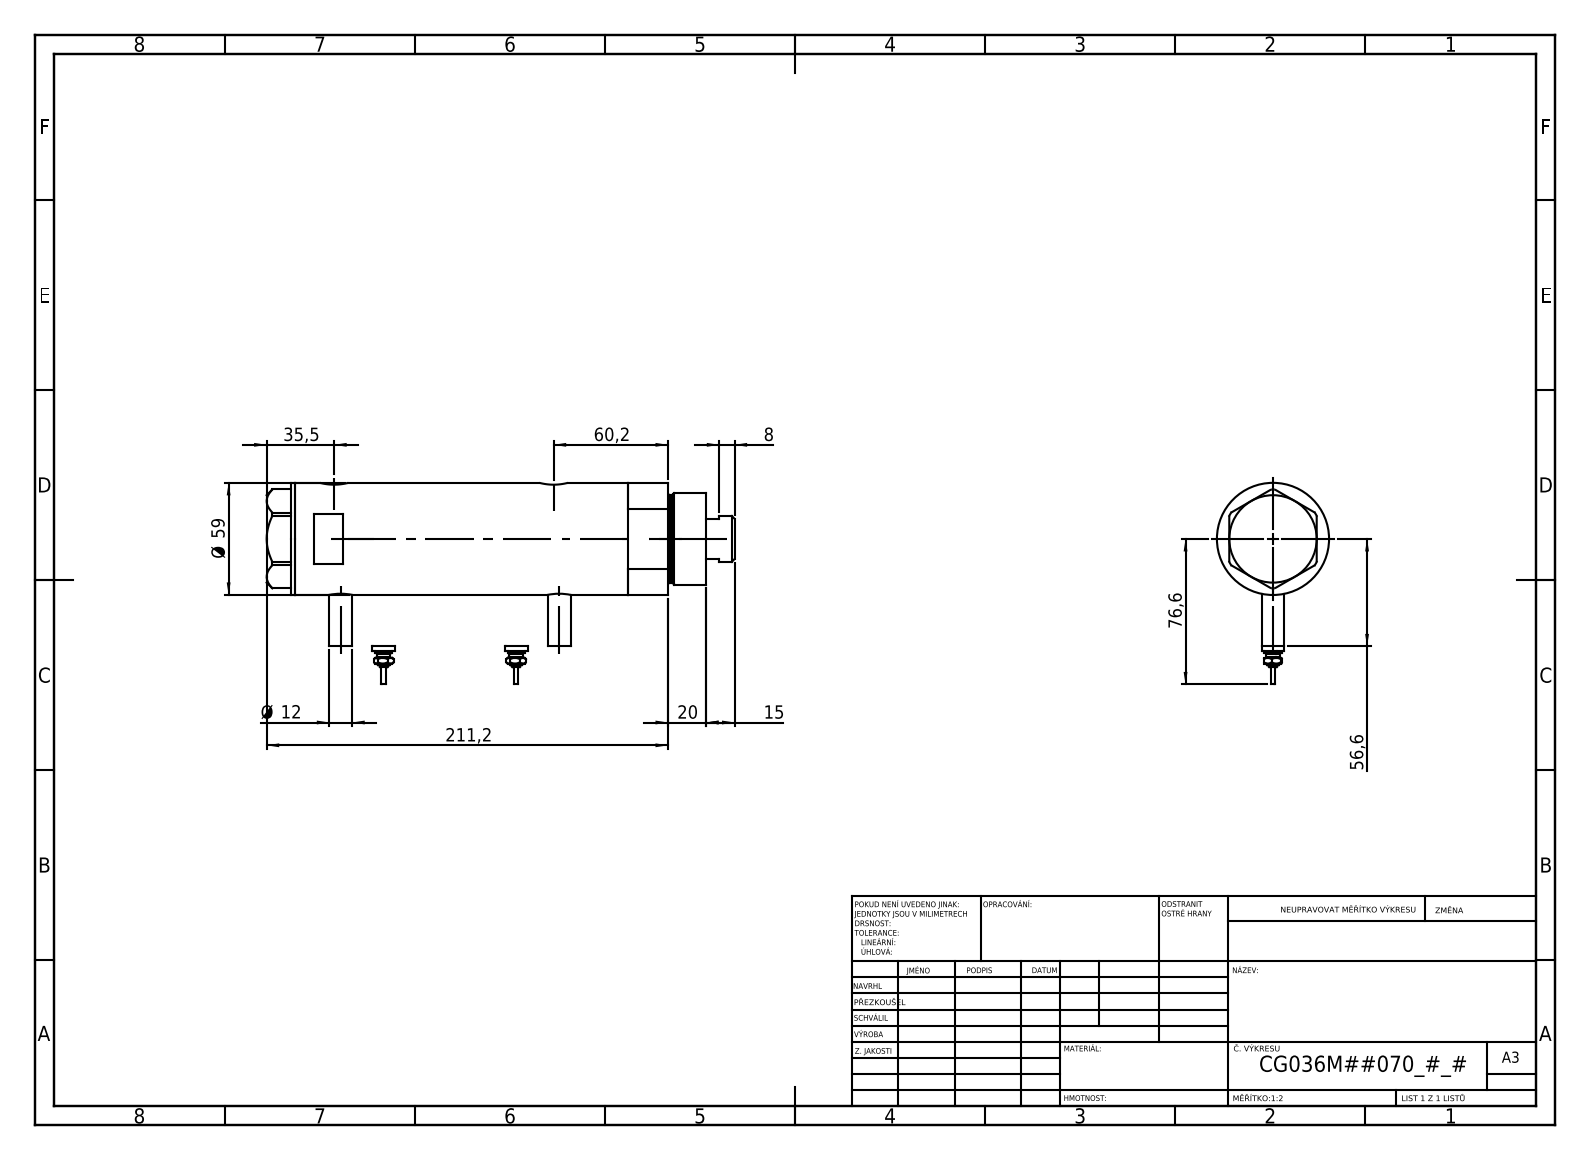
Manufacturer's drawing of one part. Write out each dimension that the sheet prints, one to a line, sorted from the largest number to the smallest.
211,2
76,6
60,2
Ø 59
56,6
35,5
20
15
Ø 12
8
